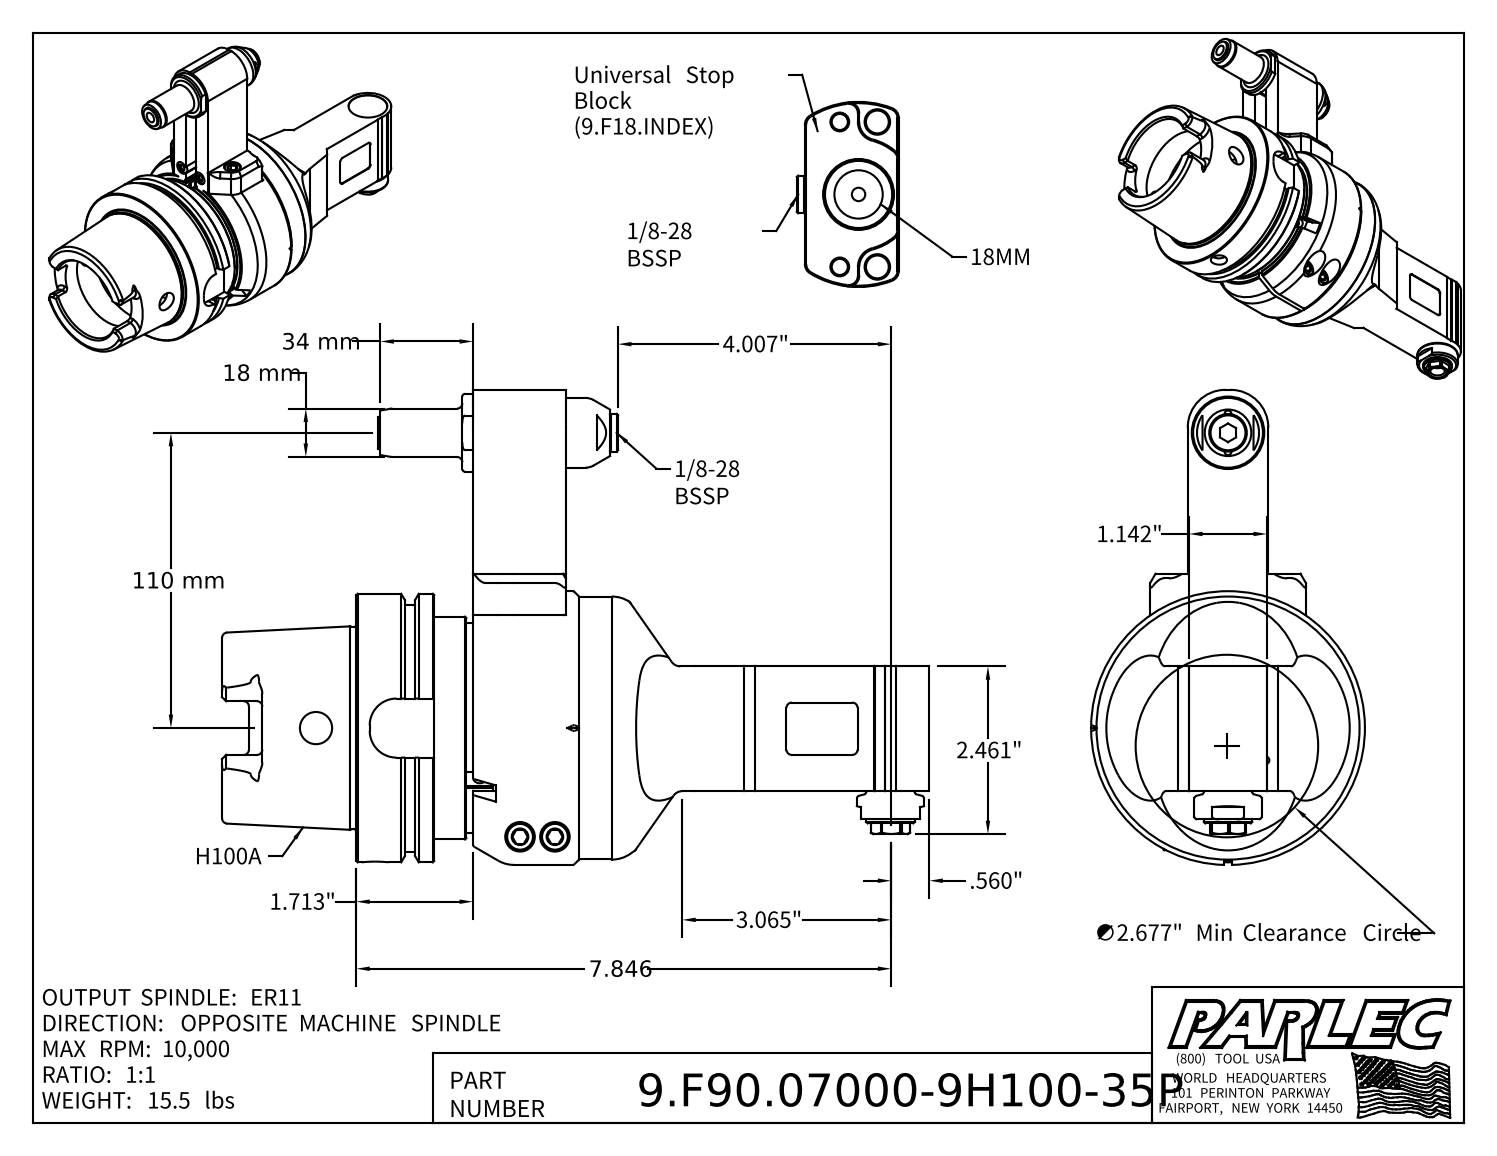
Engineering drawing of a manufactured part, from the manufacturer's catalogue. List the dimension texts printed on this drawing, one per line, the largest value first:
110 mm
34 mm
18 mm
7.846
4.007"
3.065"
∅2.677" Min Clearance Circle
2.461"
1.713"
1.142"
.560"
